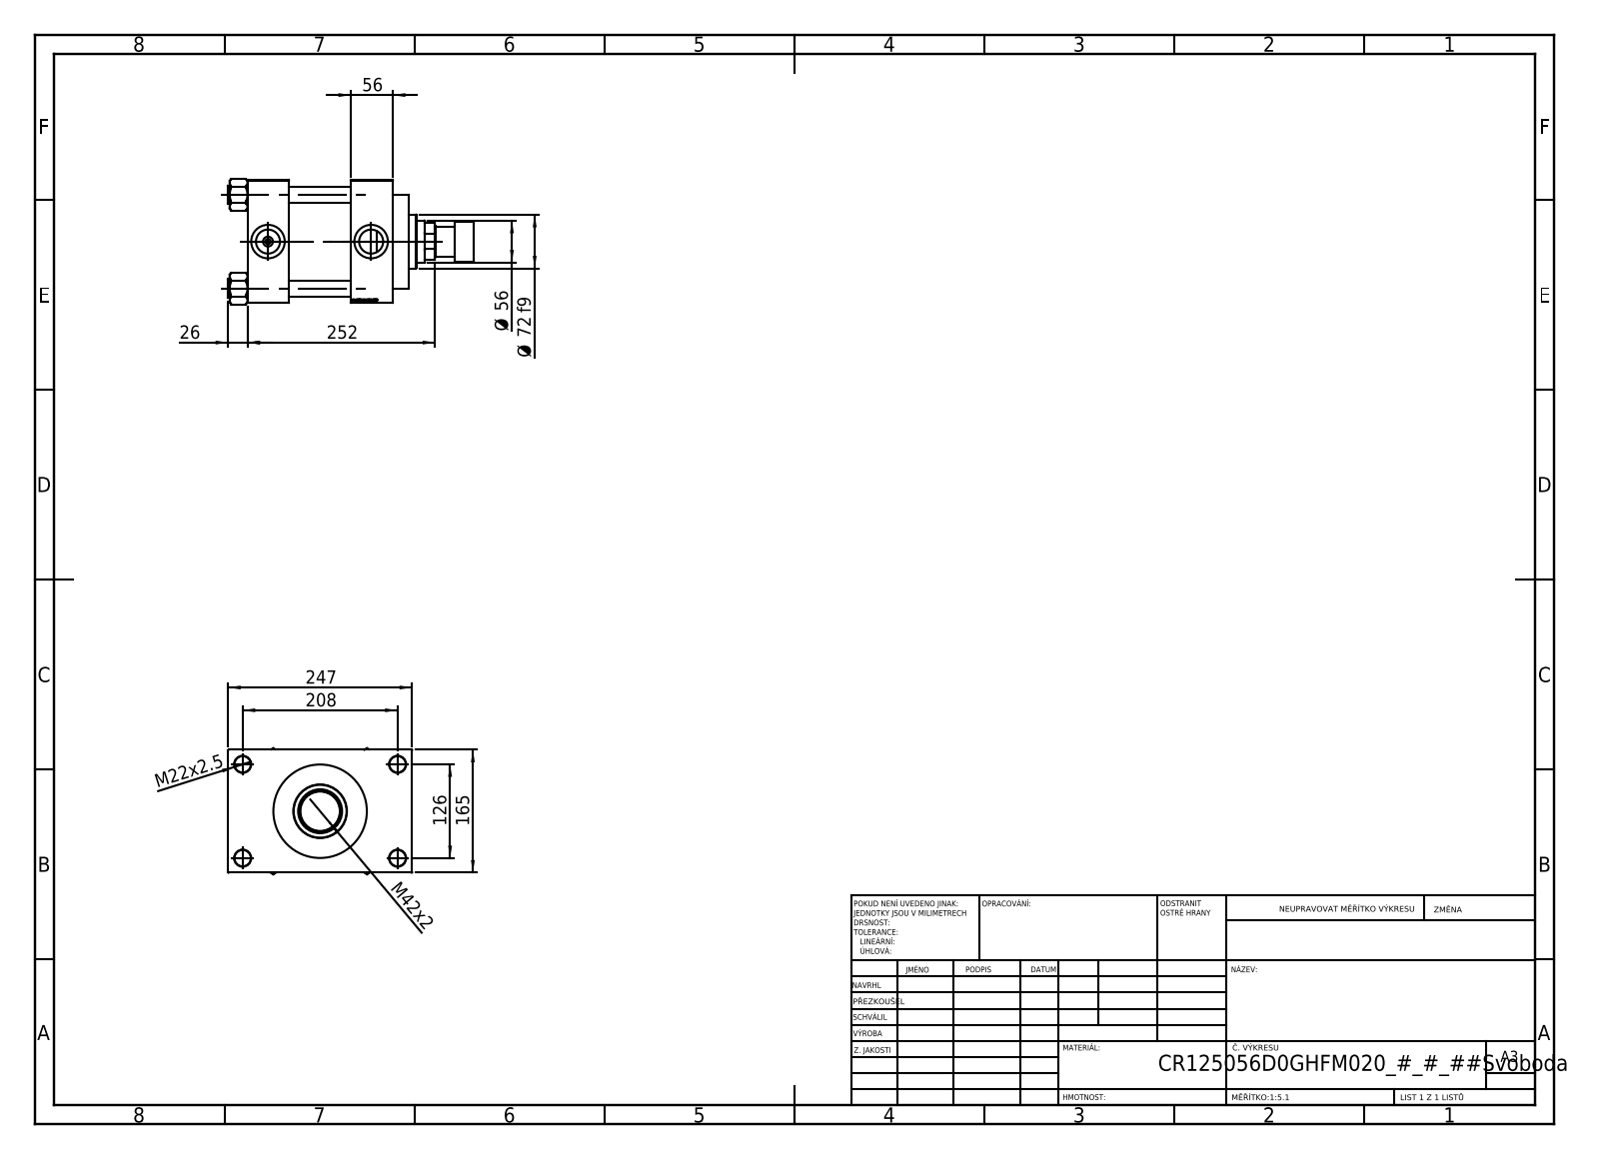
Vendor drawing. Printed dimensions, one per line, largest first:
252
247
208
165
126
Ø 72 f9
56
Ø 56
M42x2
26
M22x2.5
